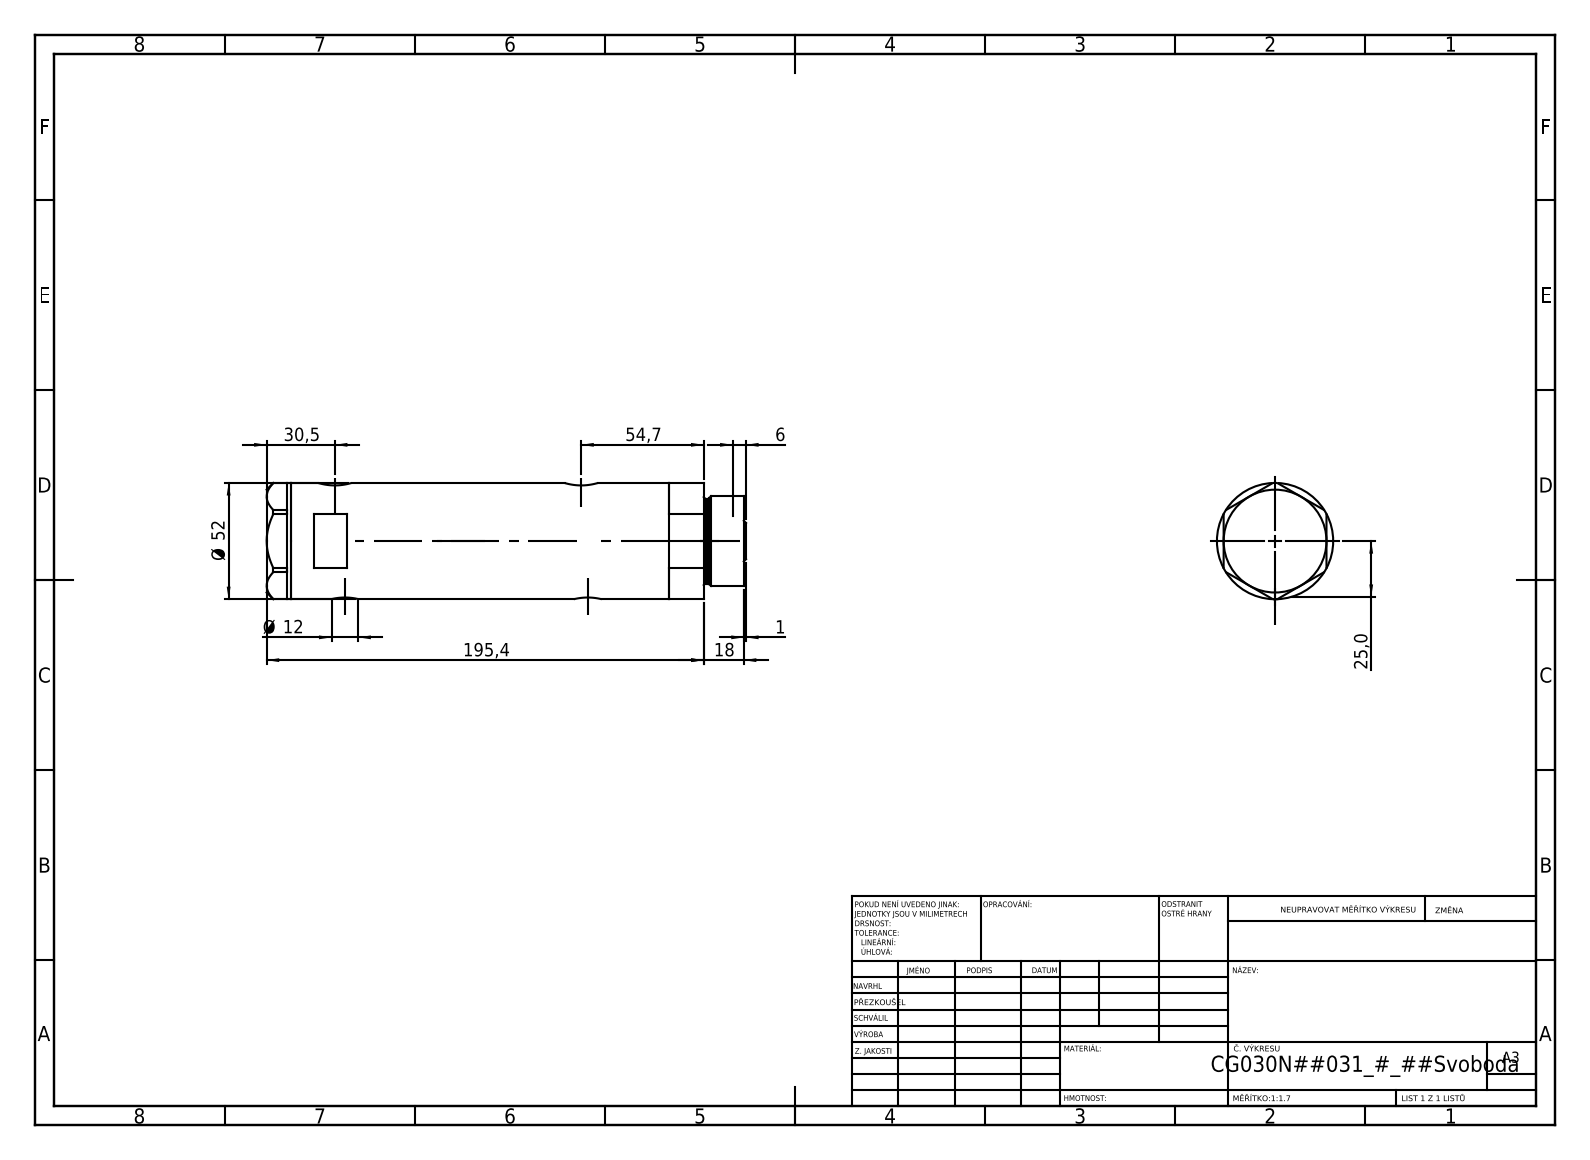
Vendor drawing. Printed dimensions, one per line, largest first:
195,4
54,7
Ø 52
30,5
25,0
18
Ø 12
6
1
